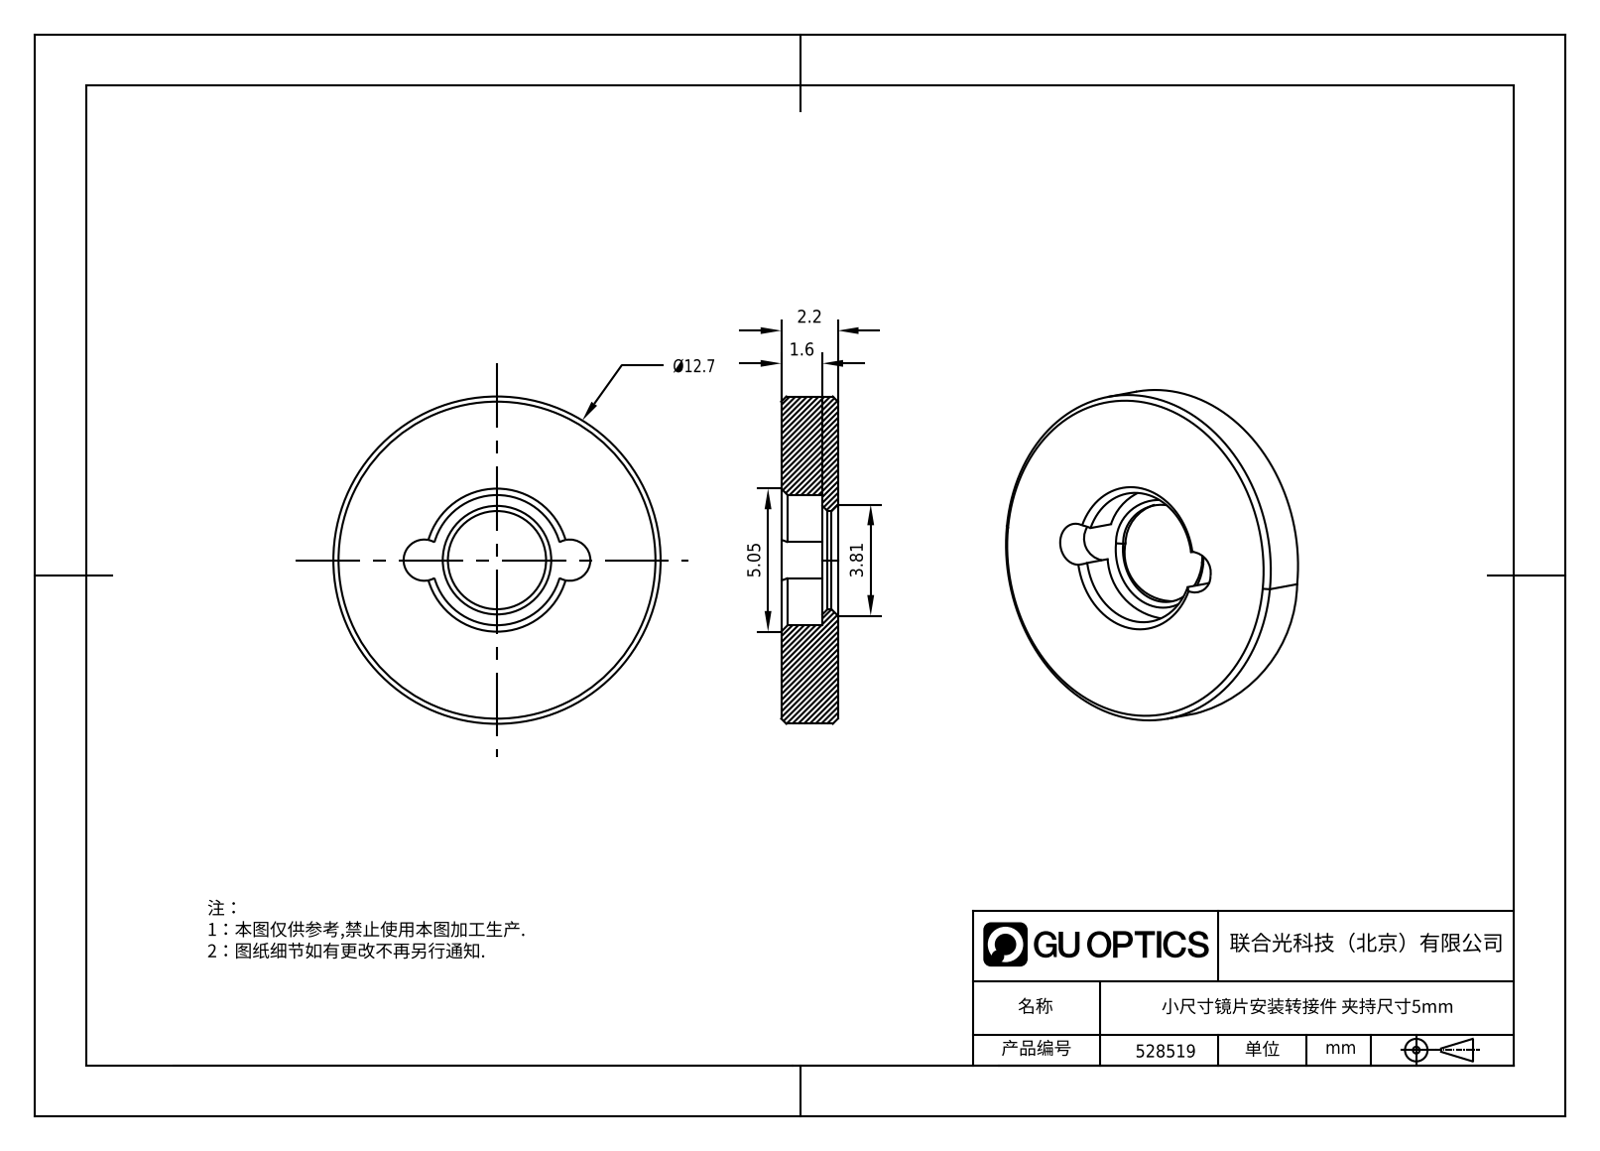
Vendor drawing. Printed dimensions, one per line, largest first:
5.05
3.81
2.2
1.6
